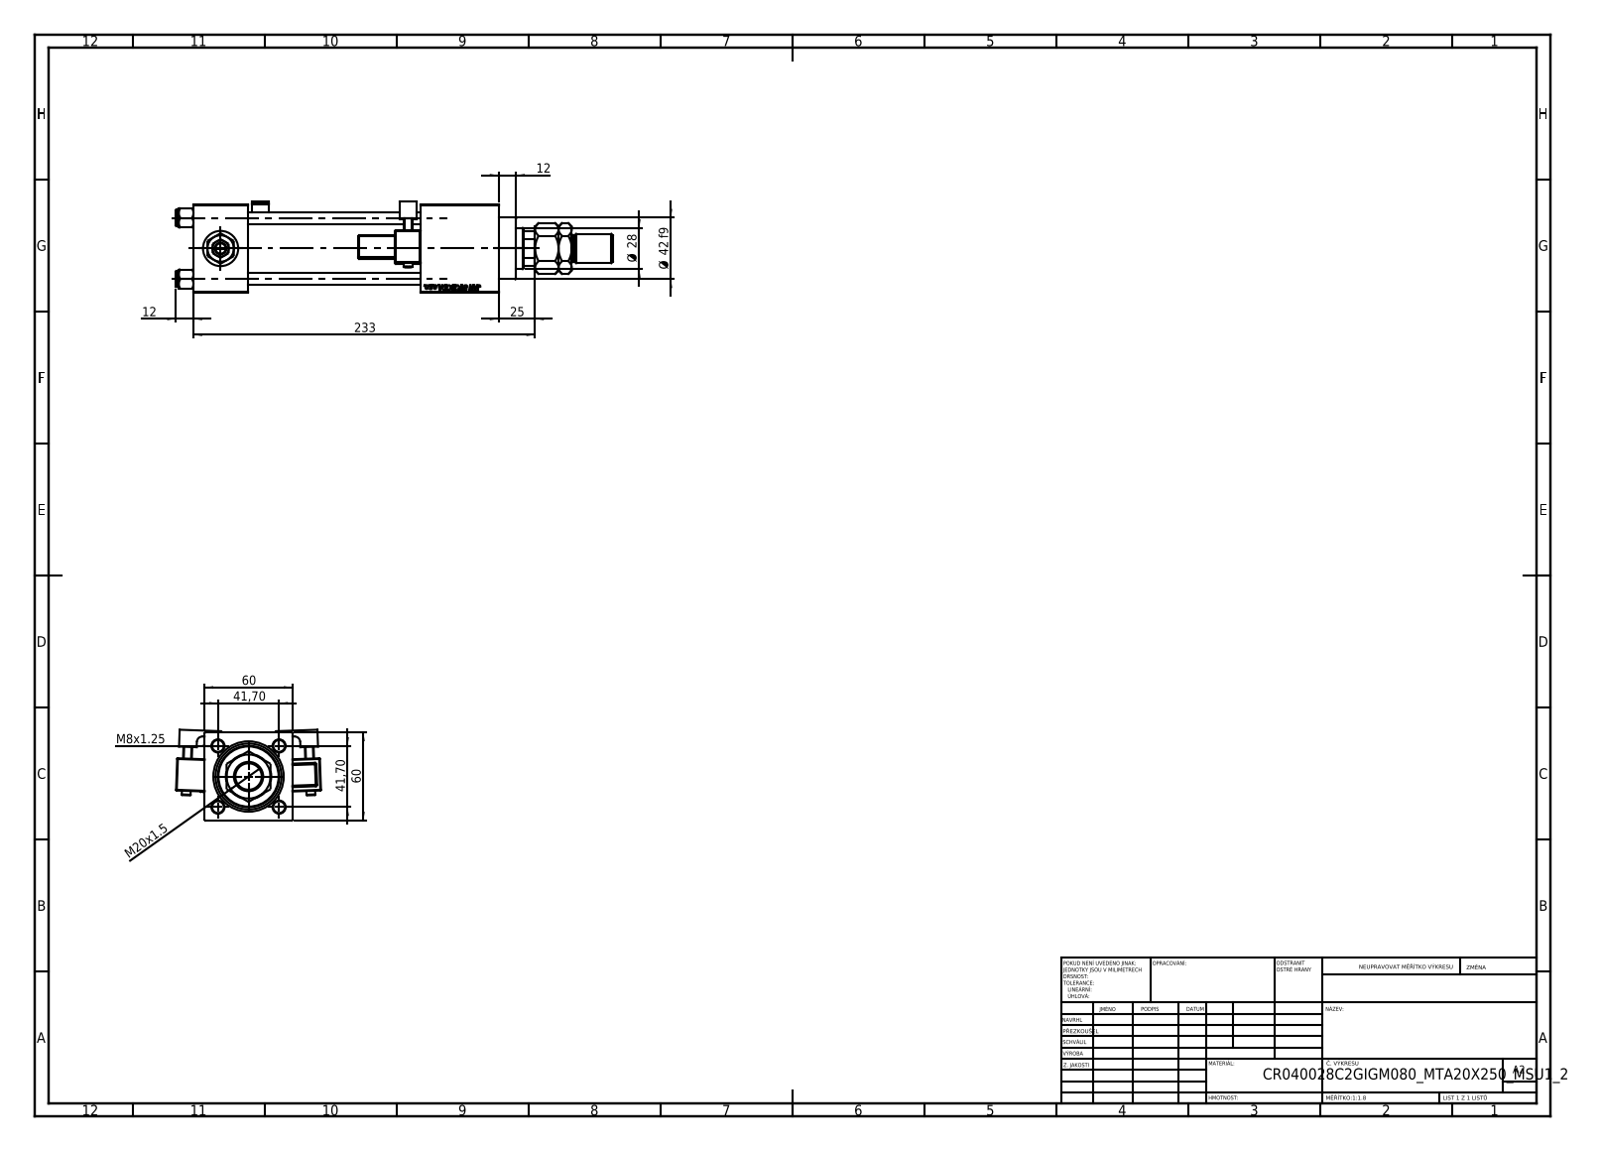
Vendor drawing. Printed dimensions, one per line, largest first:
233
60
60
Ø 42 f9
41,70
41,70
Ø 28
25
M20x1.5
12
12
M8x1.25
